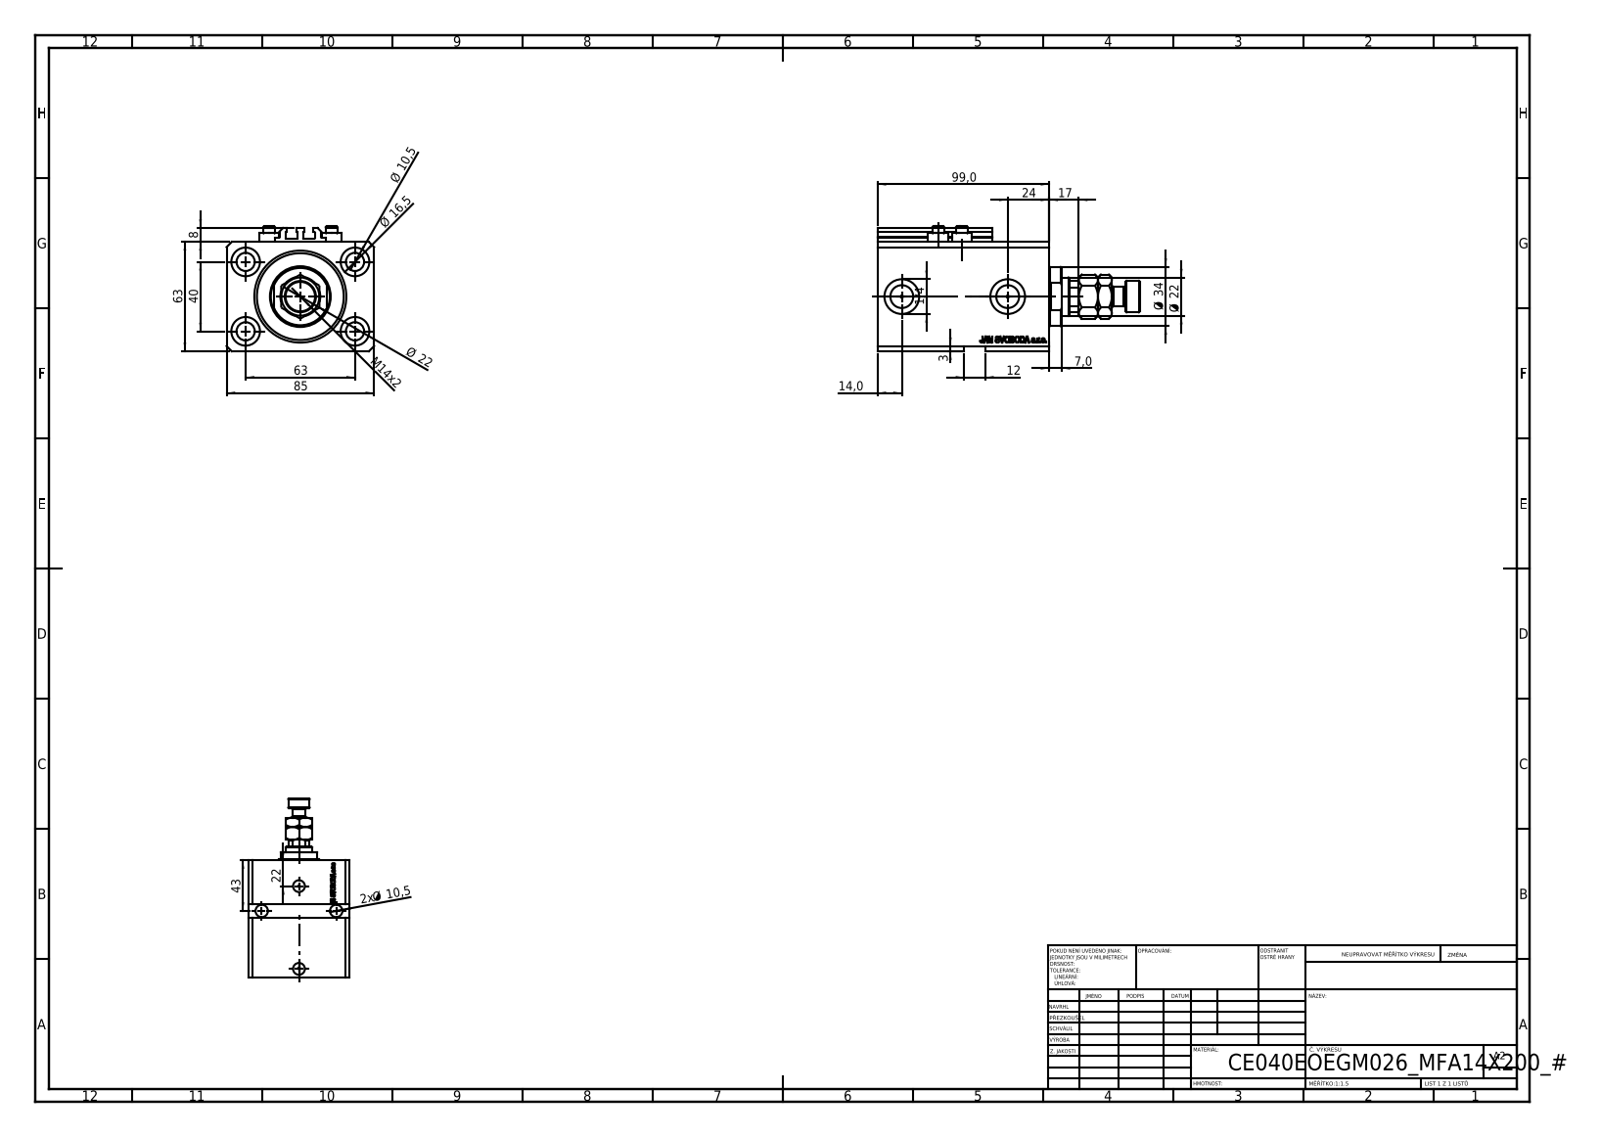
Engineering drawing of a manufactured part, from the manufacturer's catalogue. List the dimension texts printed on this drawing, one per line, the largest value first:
99,0
85
63
63
43
40
Ø 34
24
Ø 22
Ø 22
22
17
Ø 16,5
M14x2
14,0
12
Ø 10,5
2x Ø 10,5
8
7,0
3
1/4
